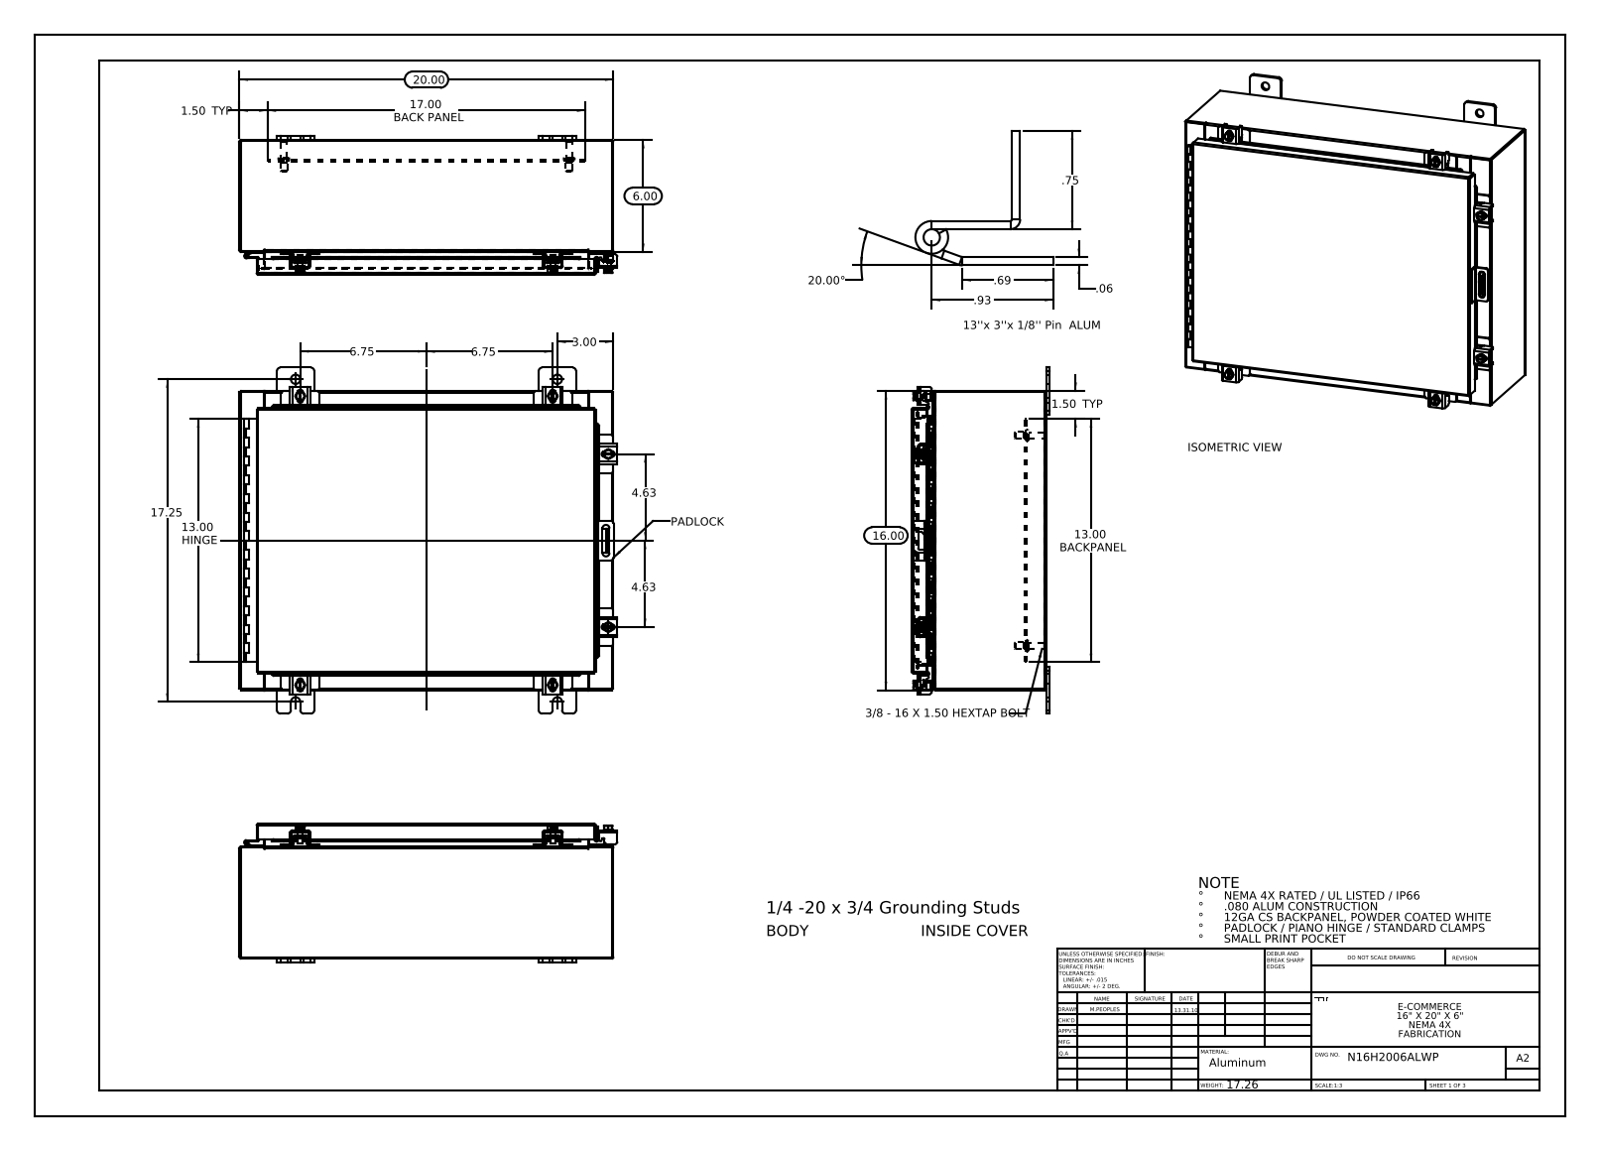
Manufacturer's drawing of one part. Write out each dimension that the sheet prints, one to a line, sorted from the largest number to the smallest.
20.00
20.00°
17.25
17.00 BACK PANEL
16.00
13.00 HINGE
13.00 BACKPANEL
6.75
6.75
6.00
4.63
4.63
3.00
1.50 TYP
1.50 TYP
.93
.75
.69
.06
